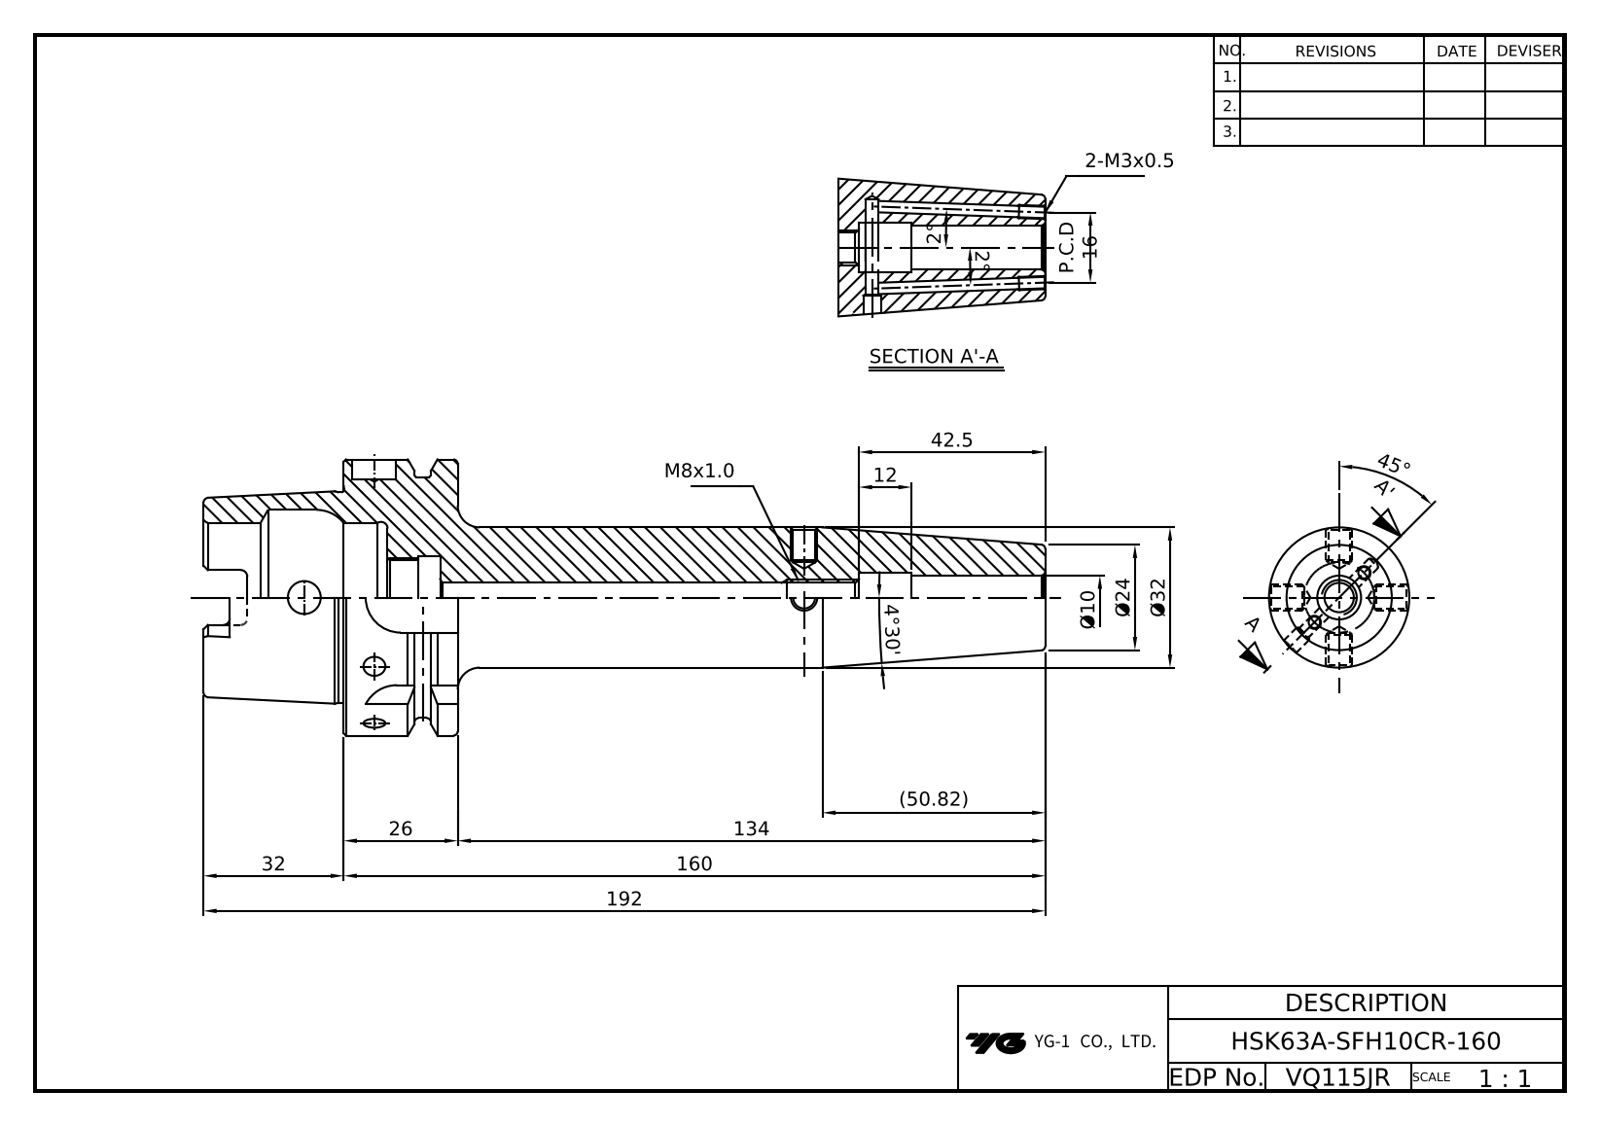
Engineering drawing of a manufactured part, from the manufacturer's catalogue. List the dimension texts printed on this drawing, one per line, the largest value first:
192
160
134
(50.82)
45°
42.5
Ø32
32
26
Ø24
P.C.D 16
12
Ø10
4°30'
2°
2°
